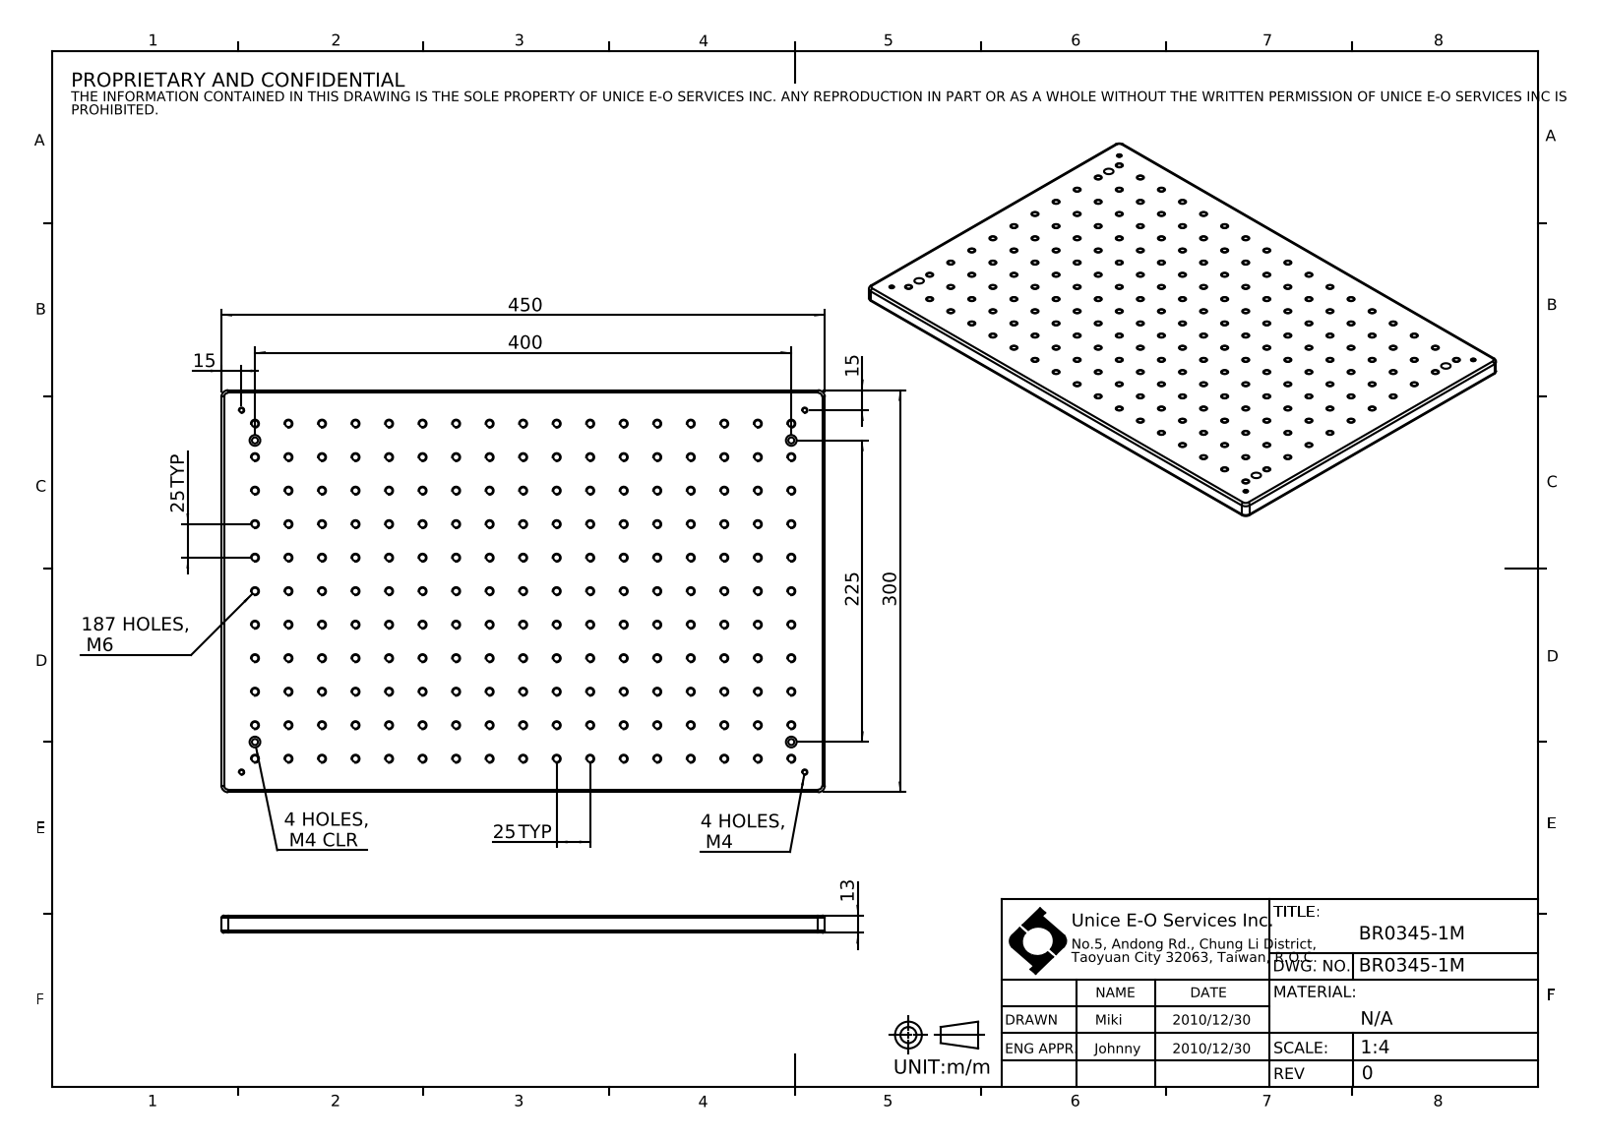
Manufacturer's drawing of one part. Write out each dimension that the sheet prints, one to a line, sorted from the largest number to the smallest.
450
400
300
225
187 HOLES, M6
25 TYP
25 TYP
15
15
13
4 HOLES, M4
4 HOLES, M4 CLR
